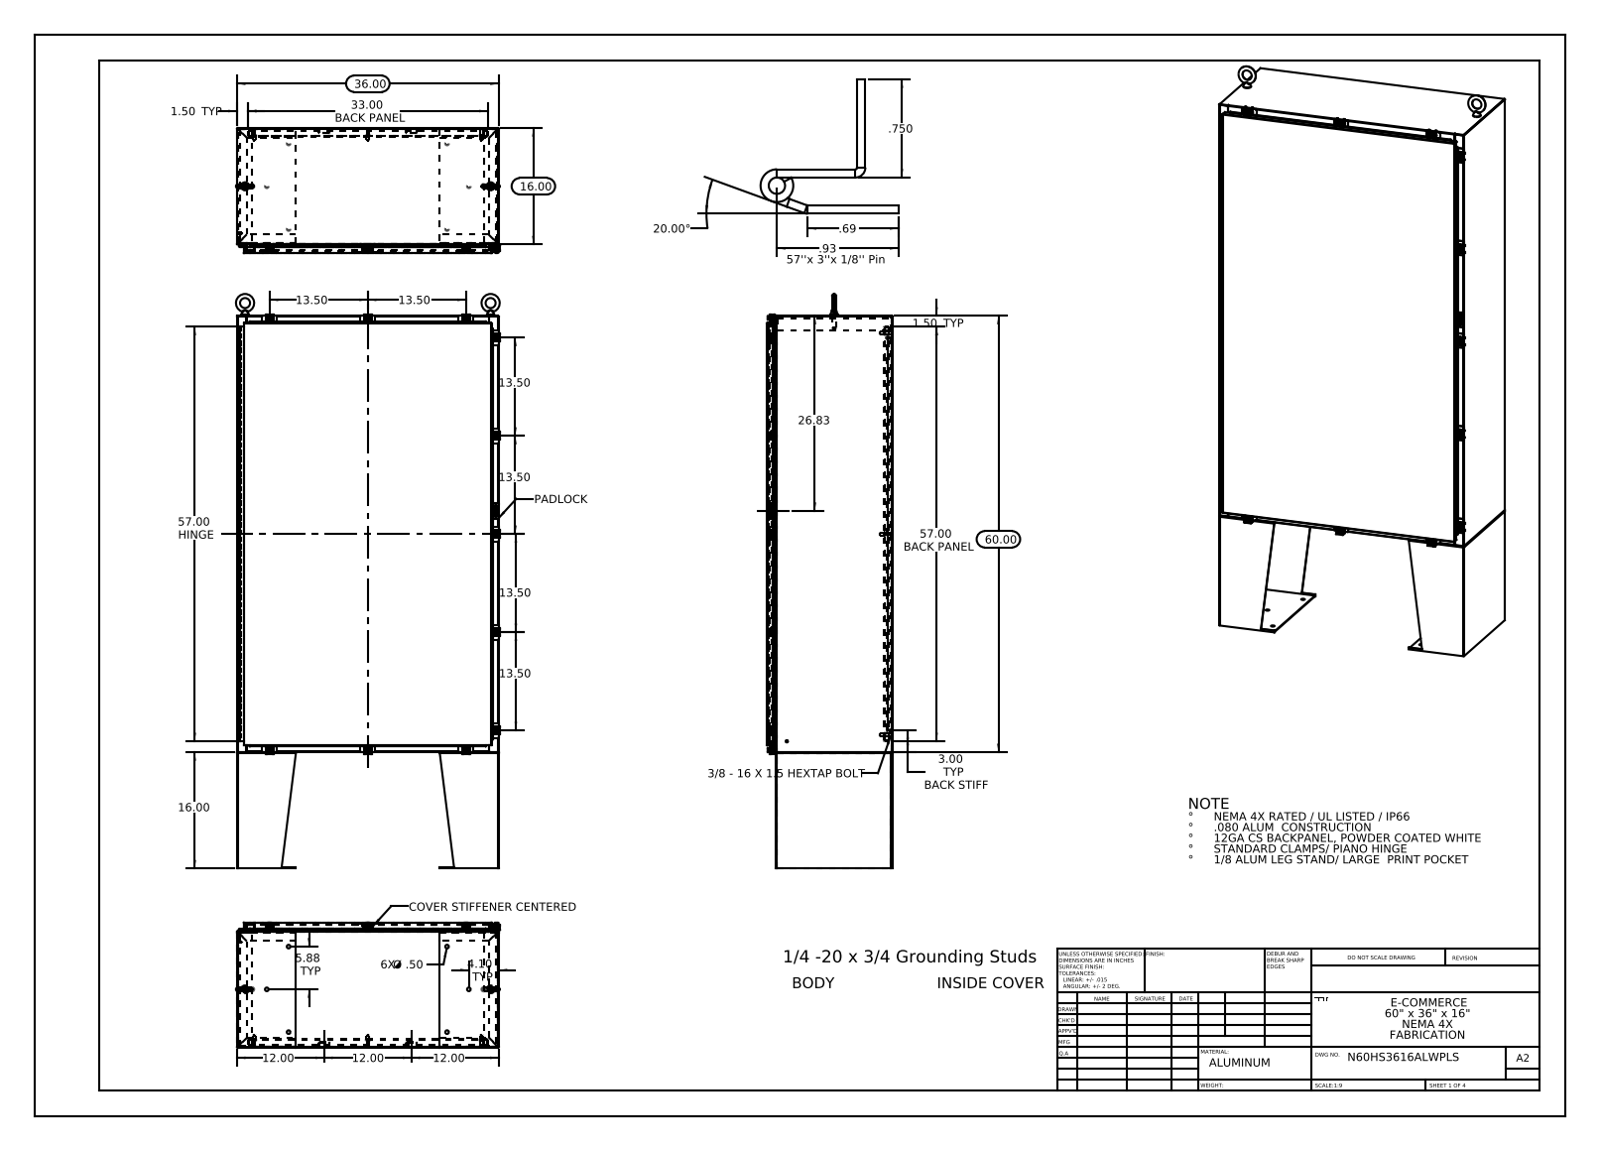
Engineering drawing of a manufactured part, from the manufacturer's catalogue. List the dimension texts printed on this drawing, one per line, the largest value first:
60.00
57.00 HINGE
57.00 BACK PANEL
36.00
33.00 BACK PANEL
26.83
20.00°
16.00
16.00
13.50
13.50
13.50
13.50
13.50
13.50
12.00
12.00
12.00
5.88 TYP
4.10 TYP
3.00 TYP BACK STIFF
1.50 TYP
1.50 TYP
.93
.750
.69
6X Ø .50
